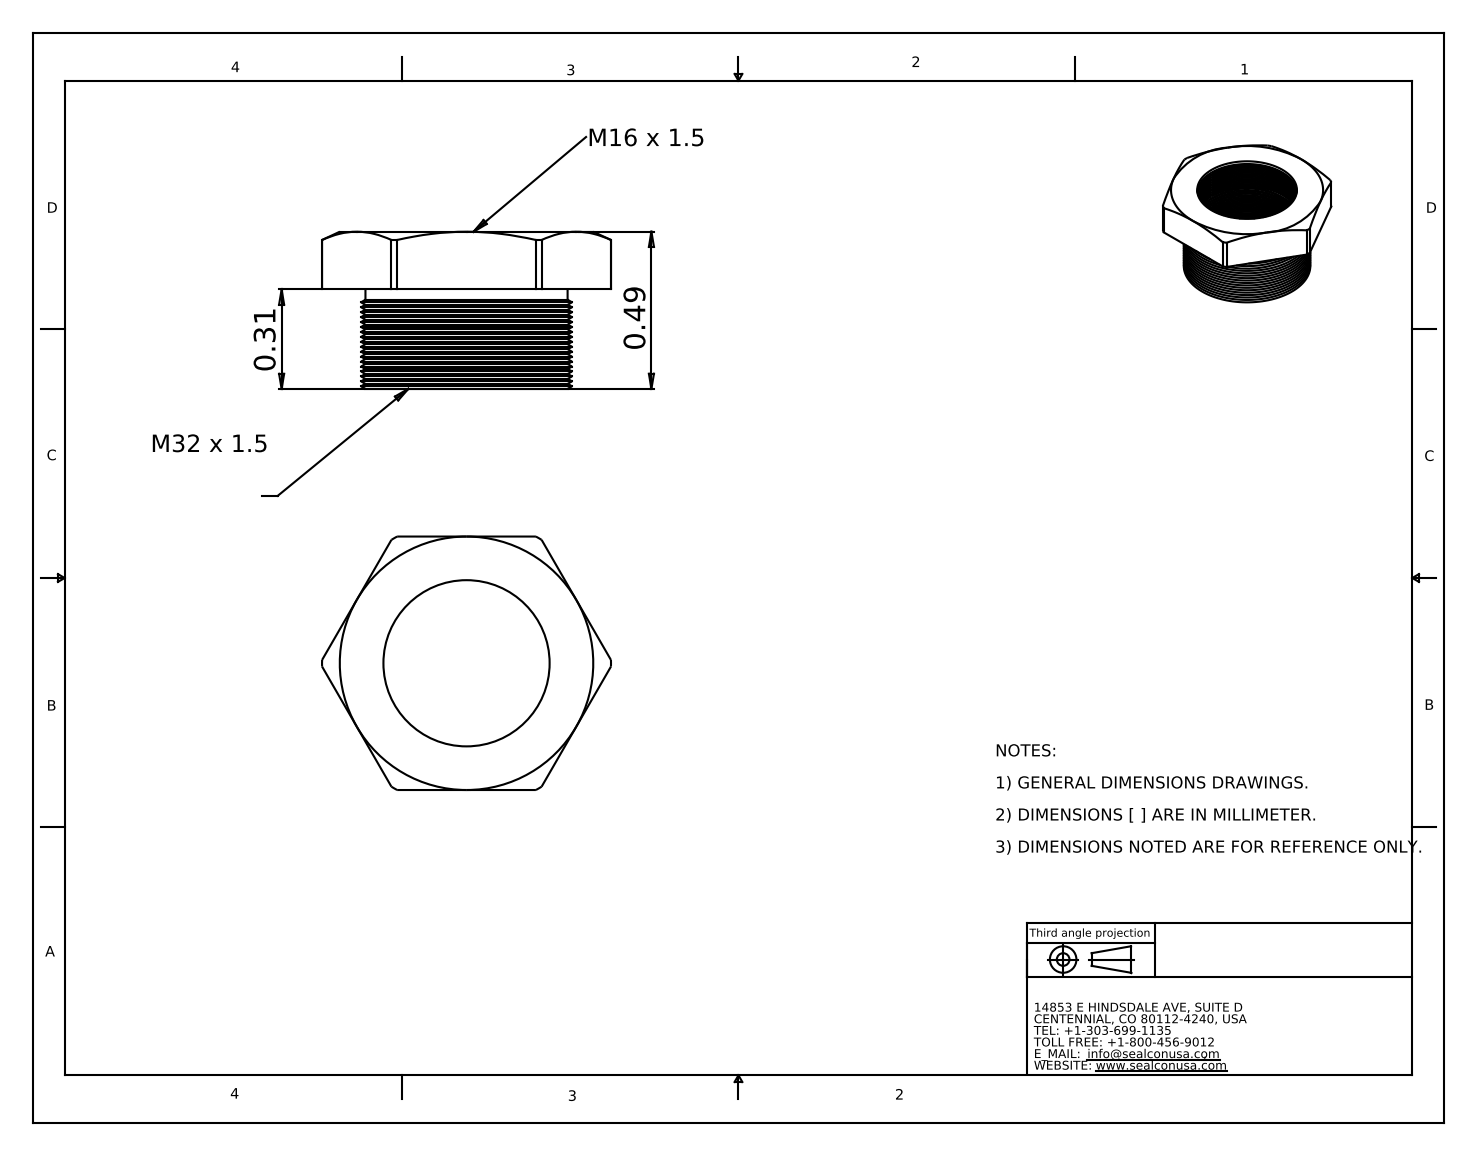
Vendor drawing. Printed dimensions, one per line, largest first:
0.49
0.31
